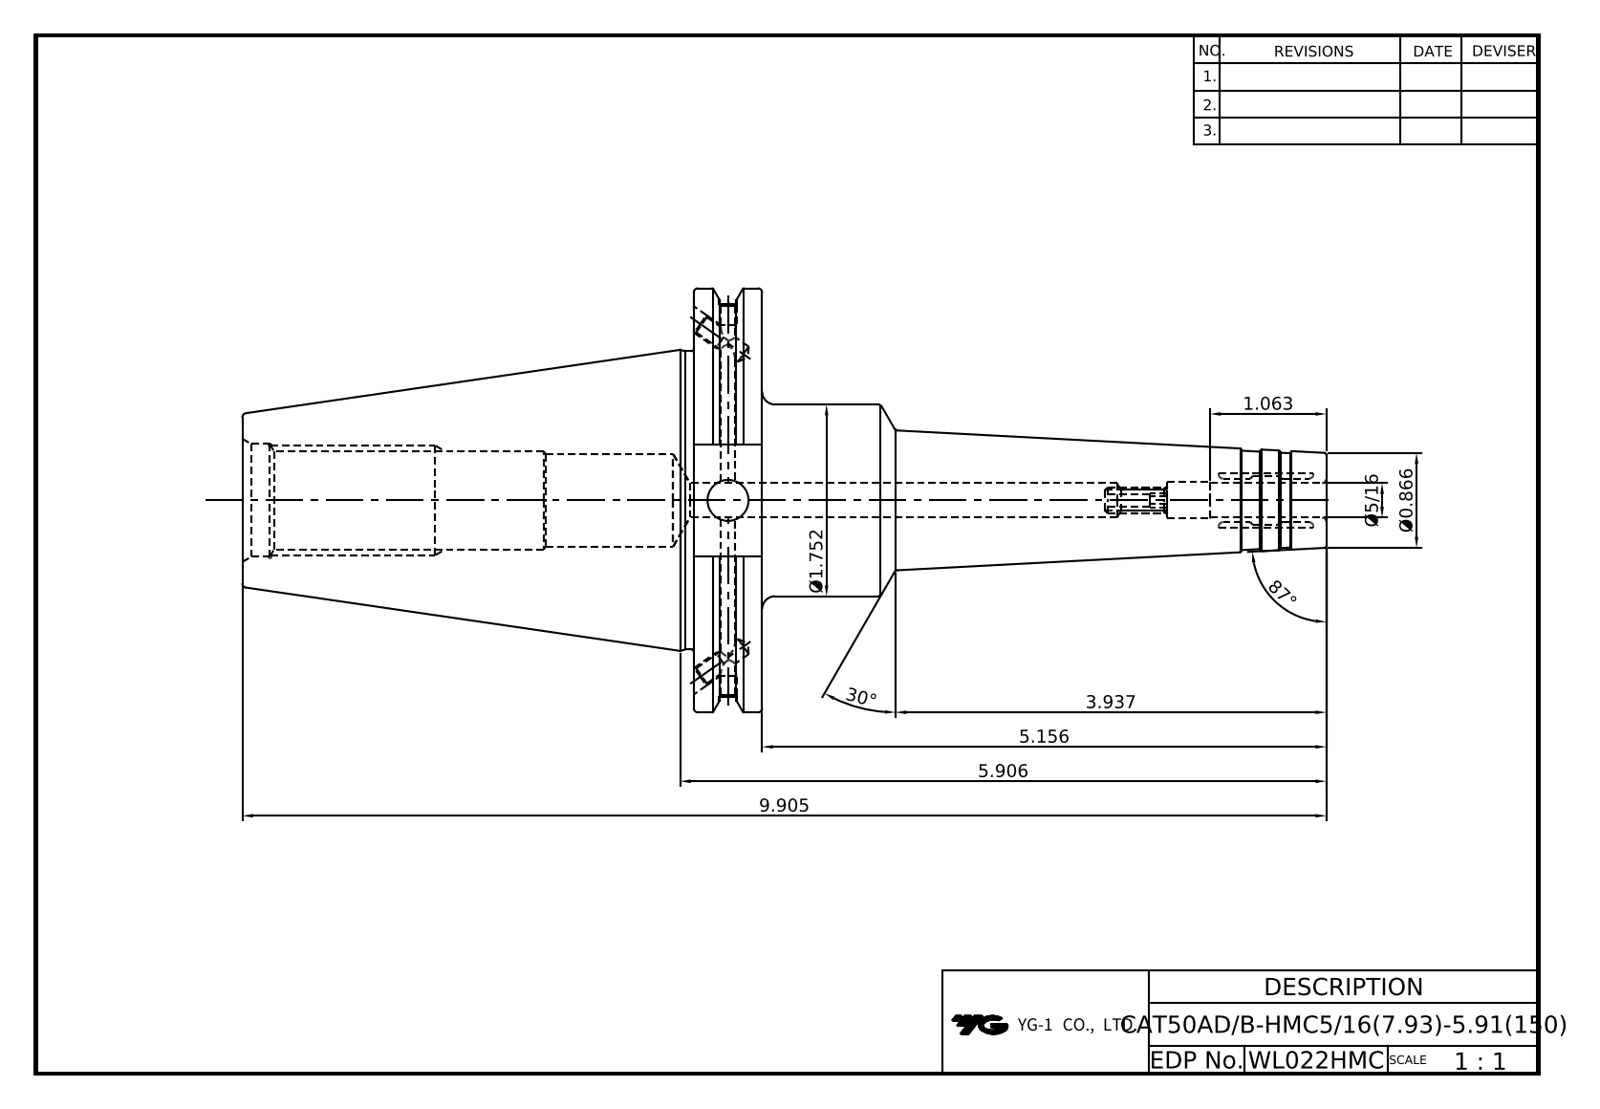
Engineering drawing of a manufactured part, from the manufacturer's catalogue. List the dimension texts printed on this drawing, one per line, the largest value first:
87°
30°
9.905
5.906
5.156
3.937
Ø1.752
1.063
Ø0.866
Ø5/16
